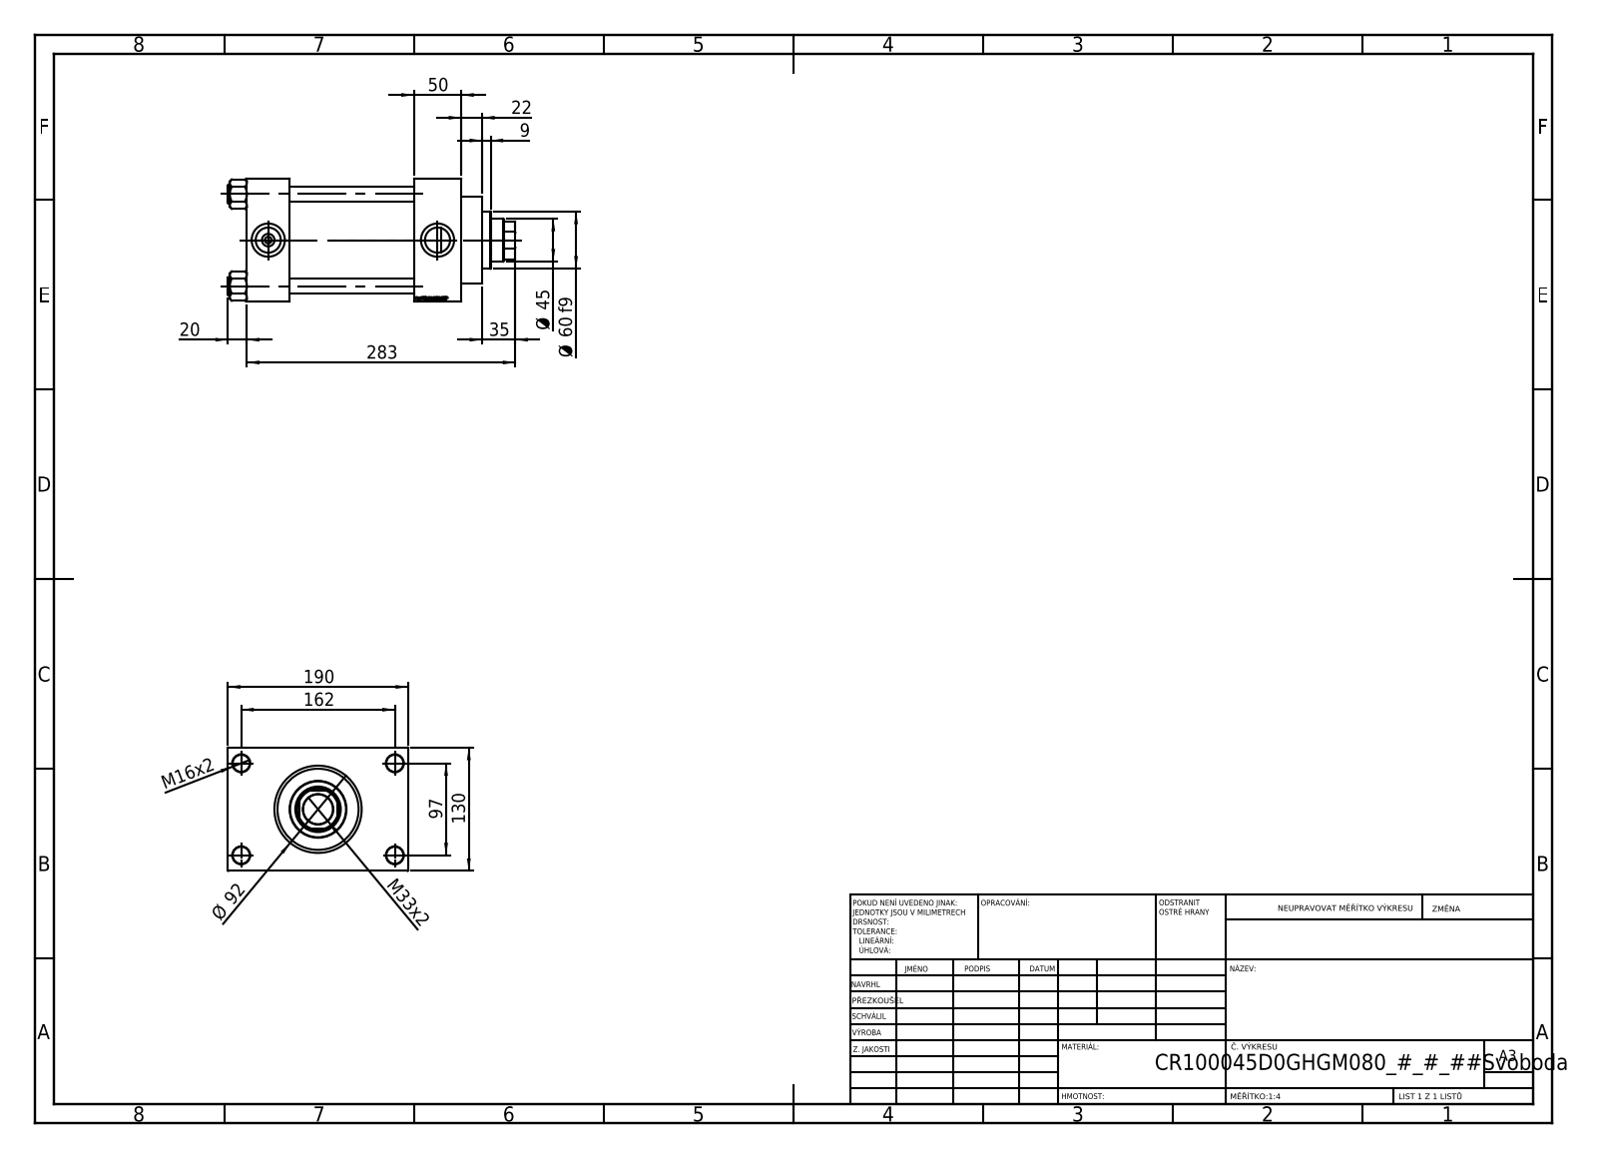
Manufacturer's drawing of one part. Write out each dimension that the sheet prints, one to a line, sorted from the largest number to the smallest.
283
190
162
130
97
Ø 92
Ø 60 f9
50
Ø 45
35
M33x2
22
20
M16x2
9
